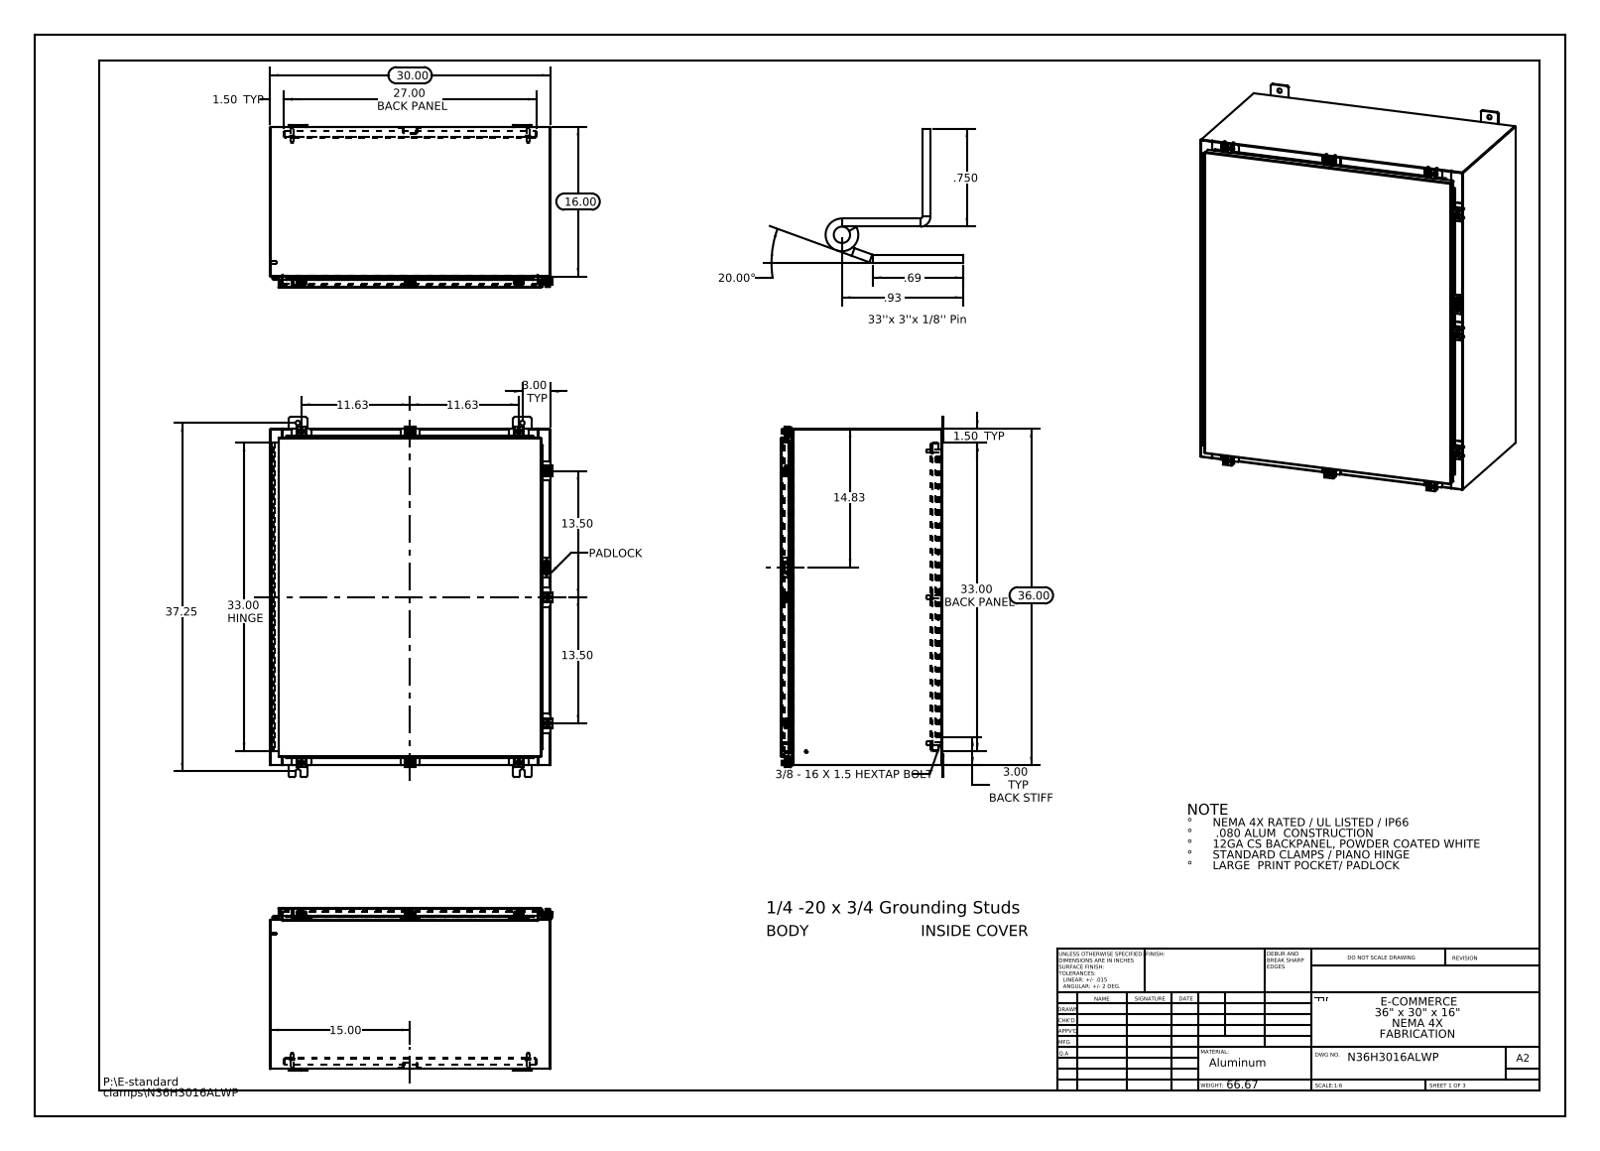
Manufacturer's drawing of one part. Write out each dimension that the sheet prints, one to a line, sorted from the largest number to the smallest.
37.25
36.00
33.00 HINGE
33.00 BACK PANEL
30.00
27.00 BACK PANEL
20.00°
16.00
15.00
14.83
13.50
13.50
11.63
11.63
3.00 TYP
3.00 TYP BACK STIFF
1.50 TYP
1.50 TYP
.93
.750
.69
